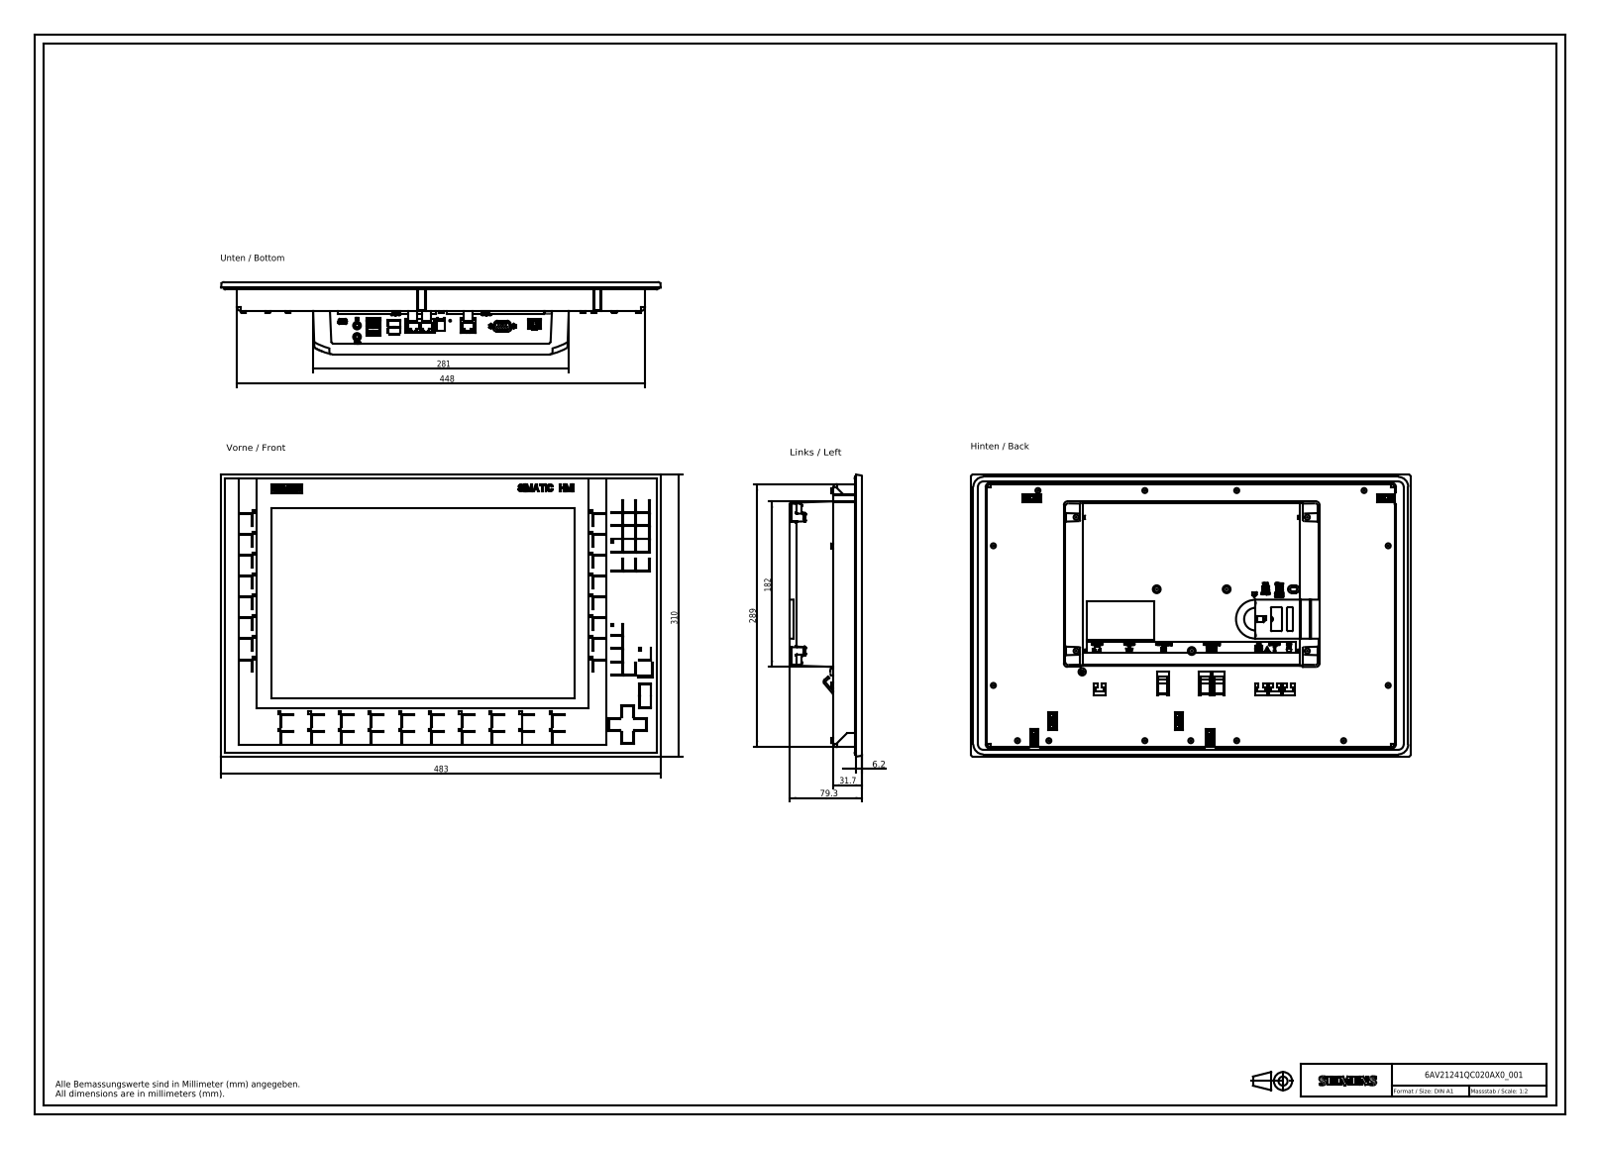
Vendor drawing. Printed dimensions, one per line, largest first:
483
448
310
289
281
182
79.3
31.7
6.2
